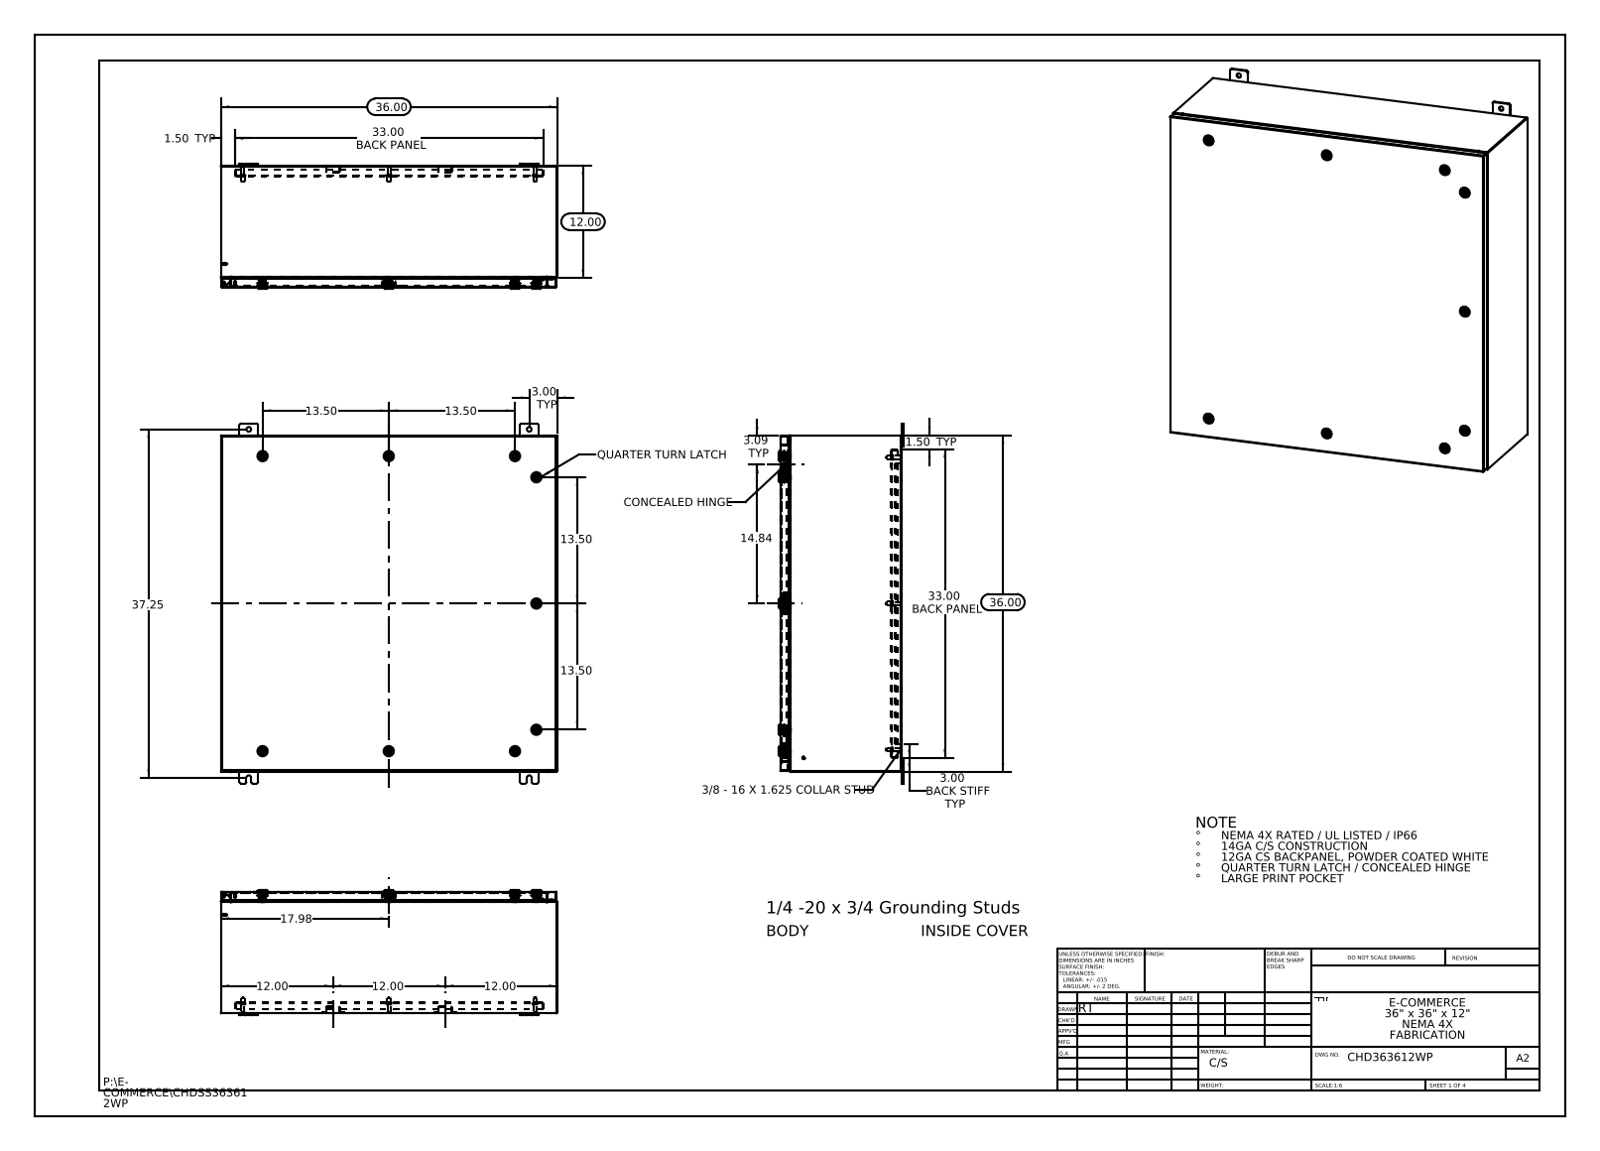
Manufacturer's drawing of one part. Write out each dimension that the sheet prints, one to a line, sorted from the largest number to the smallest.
37.25
36.00
36.00
33.00 BACK PANEL
33.00 BACK PANEL
17.98
14.84
13.50
13.50
13.50
13.50
12.00
12.00
12.00
12.00
3.09 TYP
3.00 TYP
3.00 BACK STIFF TYP
1.50 TYP
1.50 TYP
